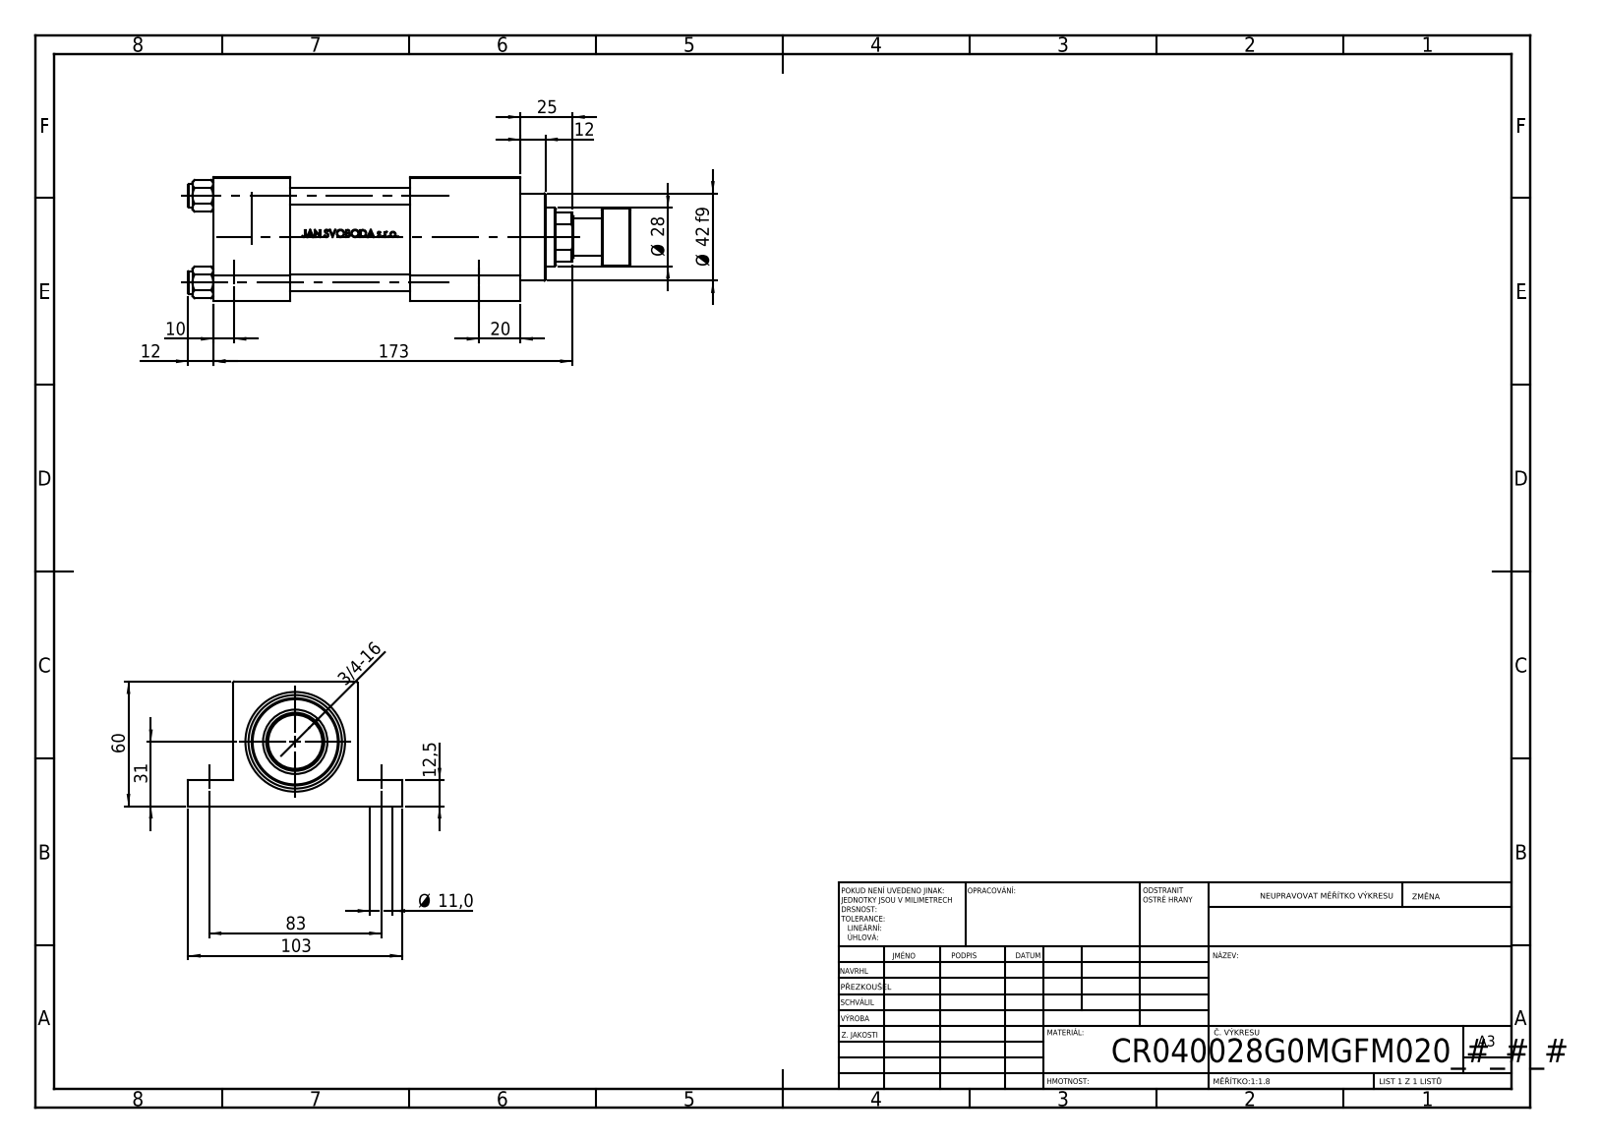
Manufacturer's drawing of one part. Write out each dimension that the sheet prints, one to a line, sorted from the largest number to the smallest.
173
103
83
60
Ø 42 f9
31
Ø 28
25
20
12,5
12
12
Ø 11,0
10
3/4-16
